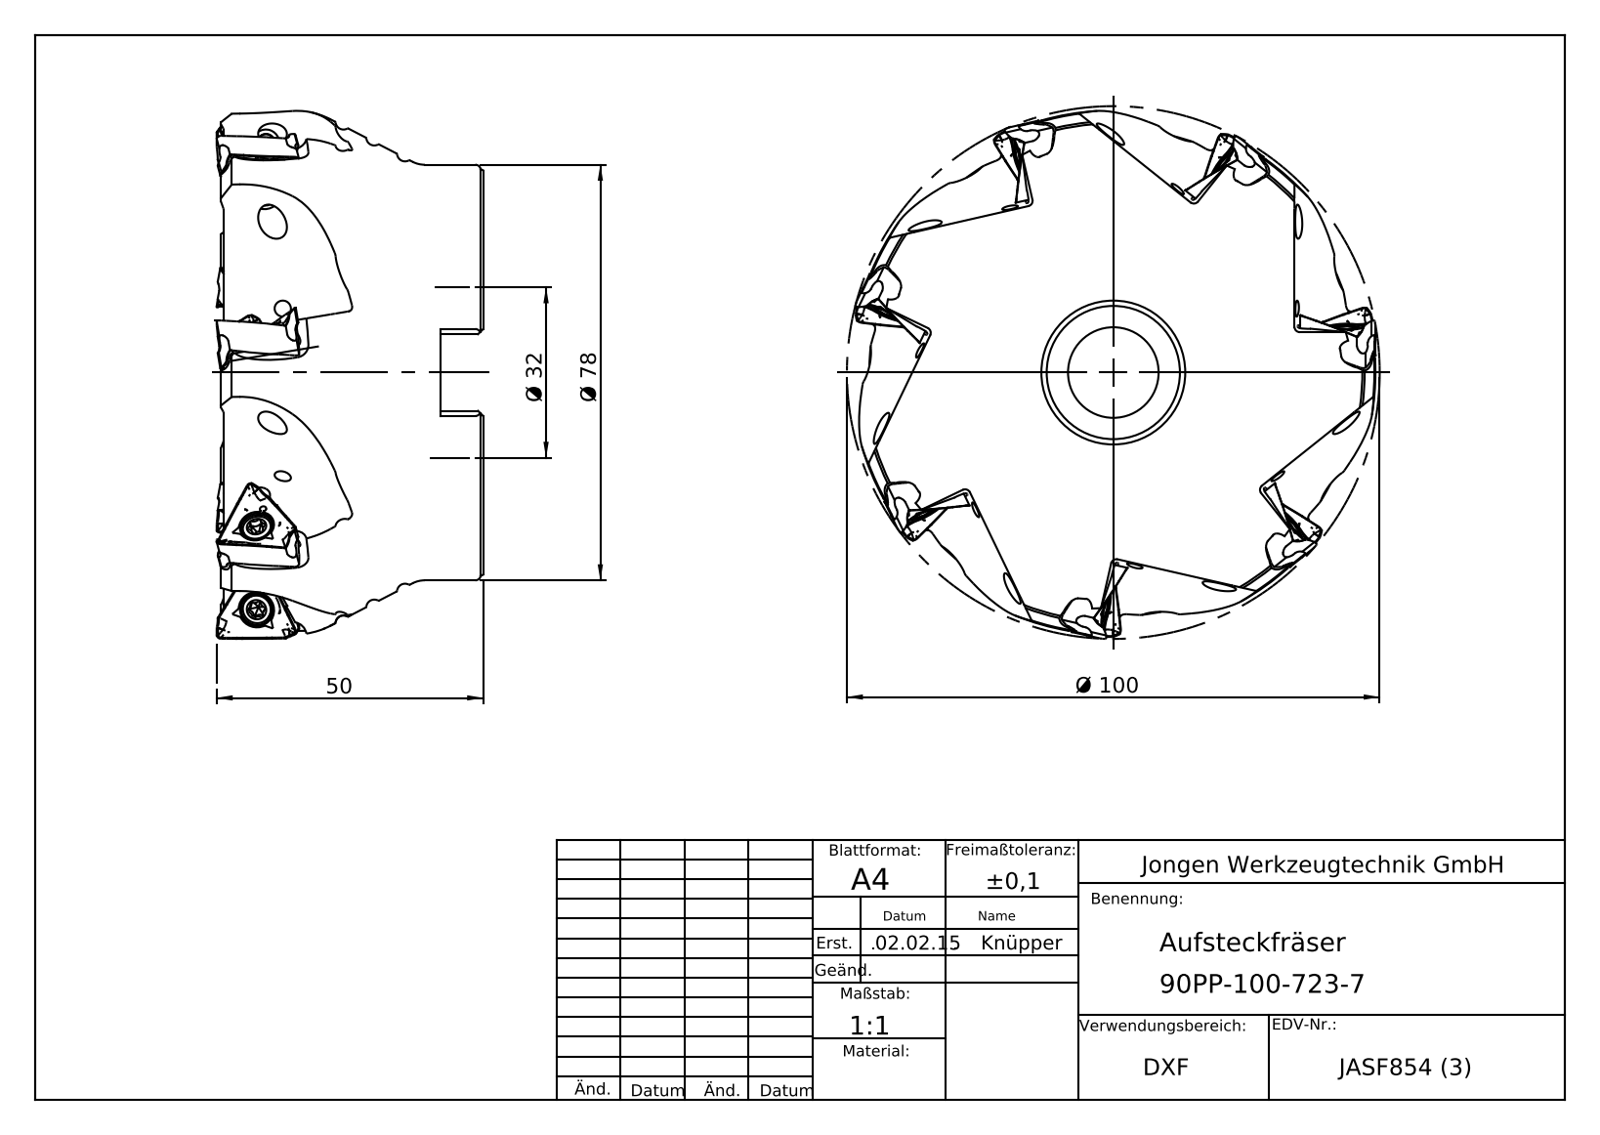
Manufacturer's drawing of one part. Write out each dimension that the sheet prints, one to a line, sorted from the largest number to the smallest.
Ø 100
Ø 78
50
Ø 32
